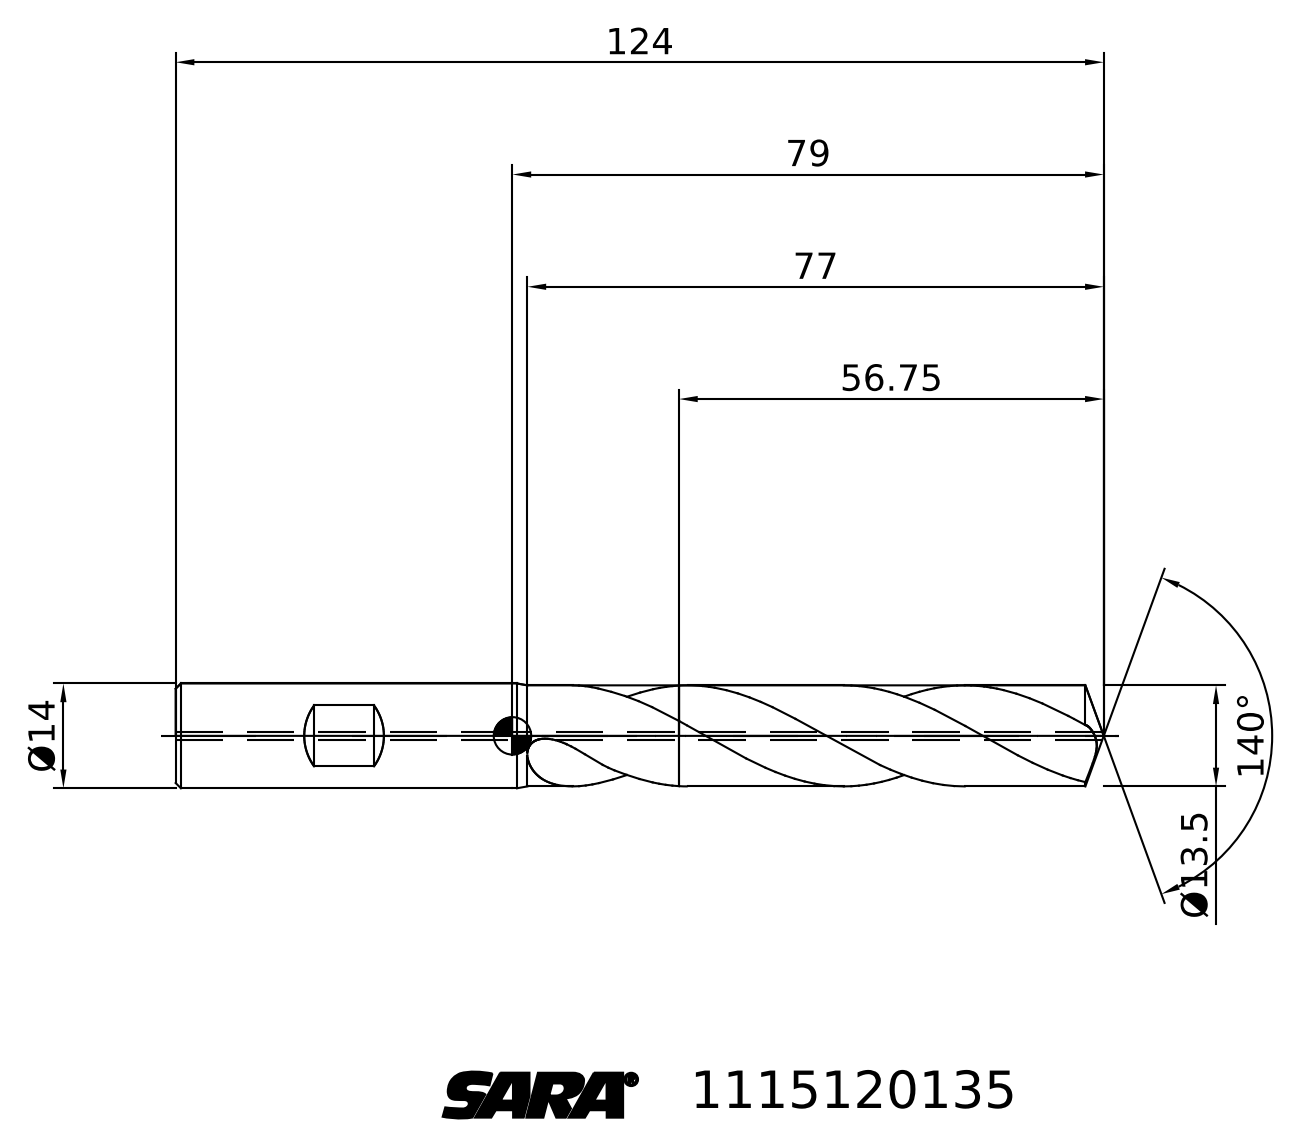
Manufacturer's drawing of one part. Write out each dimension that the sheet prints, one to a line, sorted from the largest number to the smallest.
140°
124
79
77
56.75
Ø14
Ø13.5
